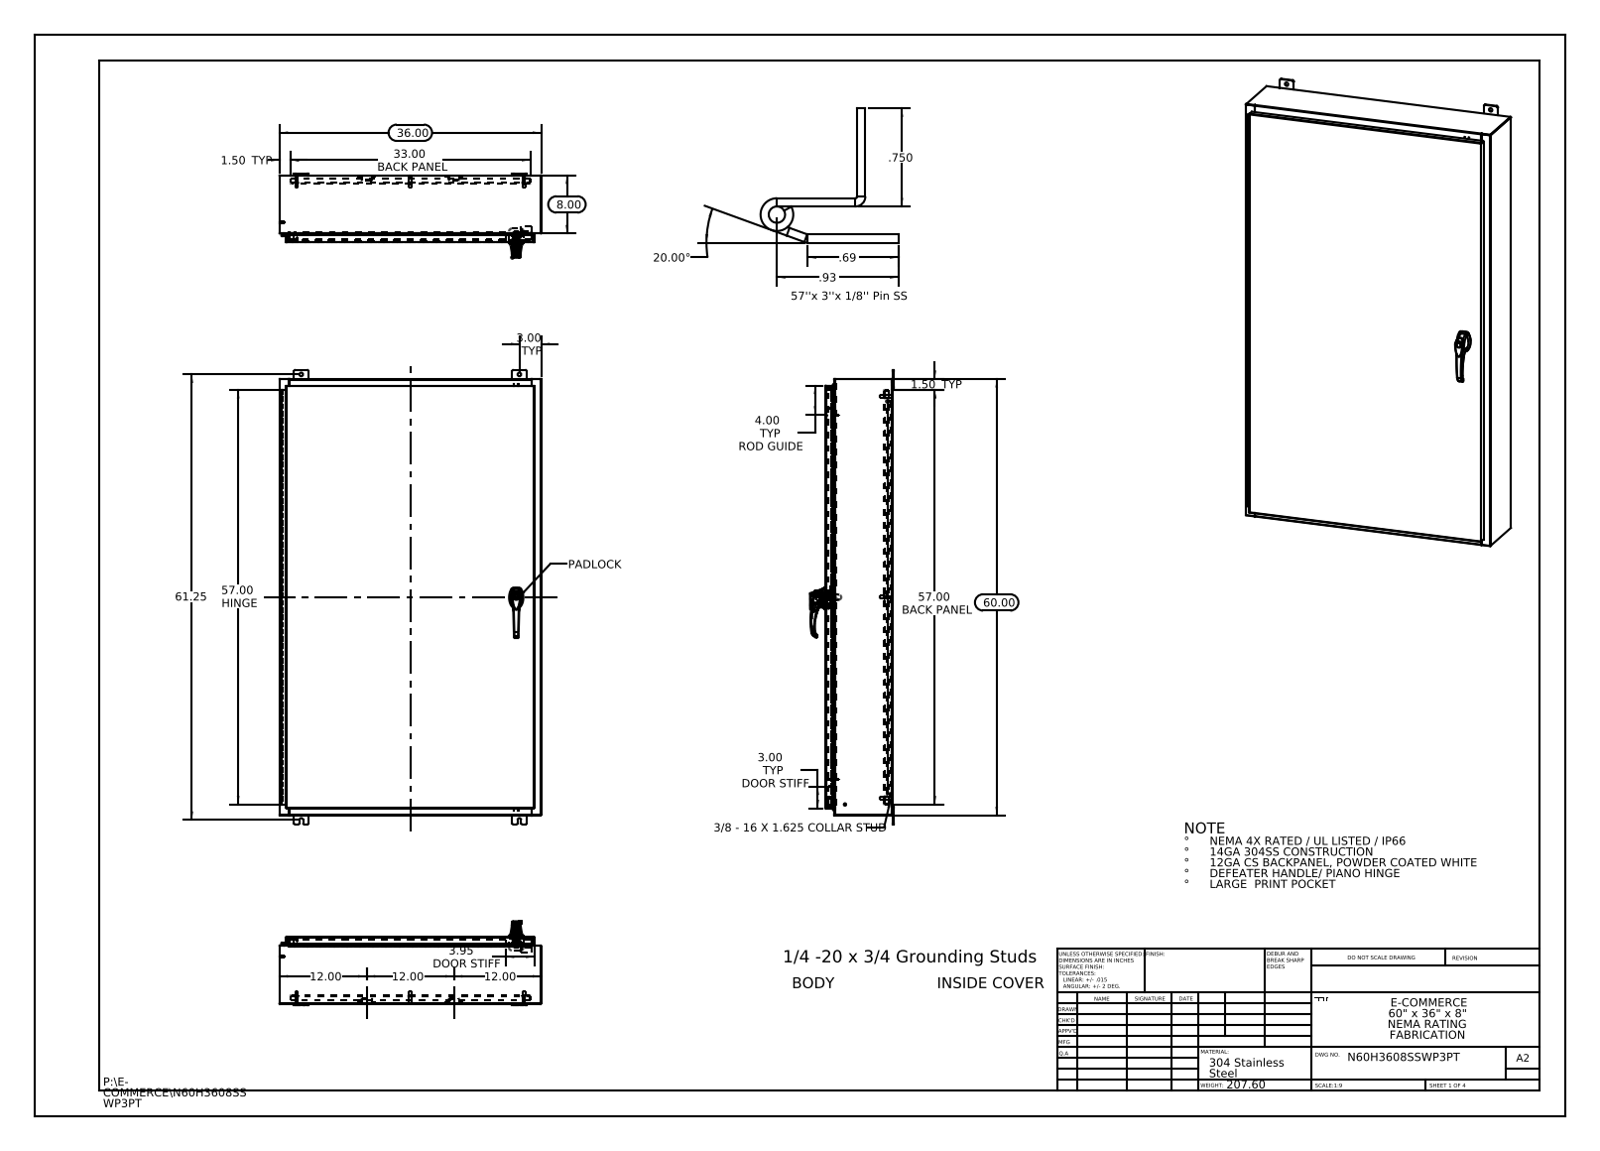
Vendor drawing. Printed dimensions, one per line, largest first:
61.25
60.00
57.00 HINGE
57.00 BACK PANEL
36.00
33.00 BACK PANEL
20.00°
12.00
12.00
12.00
8.00
4.00 TYP ROD GUIDE
3.95 DOOR STIFF
3.00 TYP
3.00 TYP DOOR STIFF
1.50 TYP
1.50 TYP
.93
.750
.69
